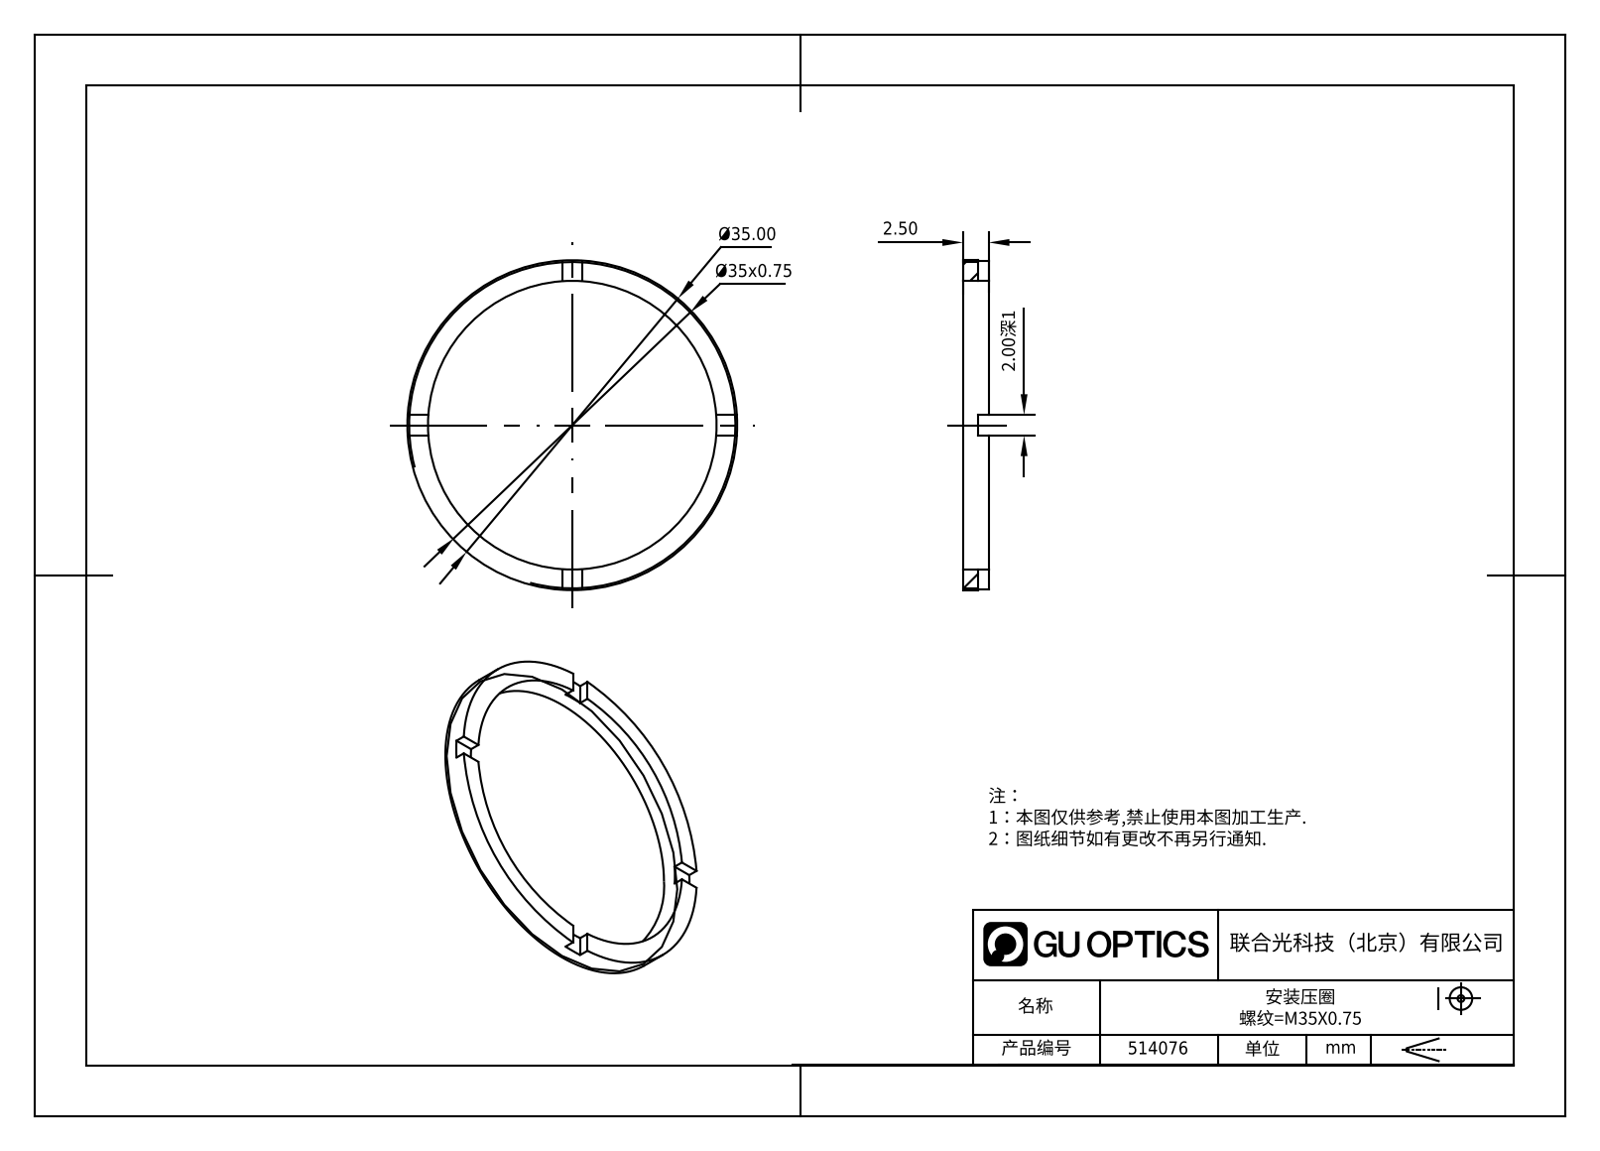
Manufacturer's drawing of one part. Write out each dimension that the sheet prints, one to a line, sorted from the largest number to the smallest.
Ø35.00
Ø35x0.75
2.50
2.00深1
